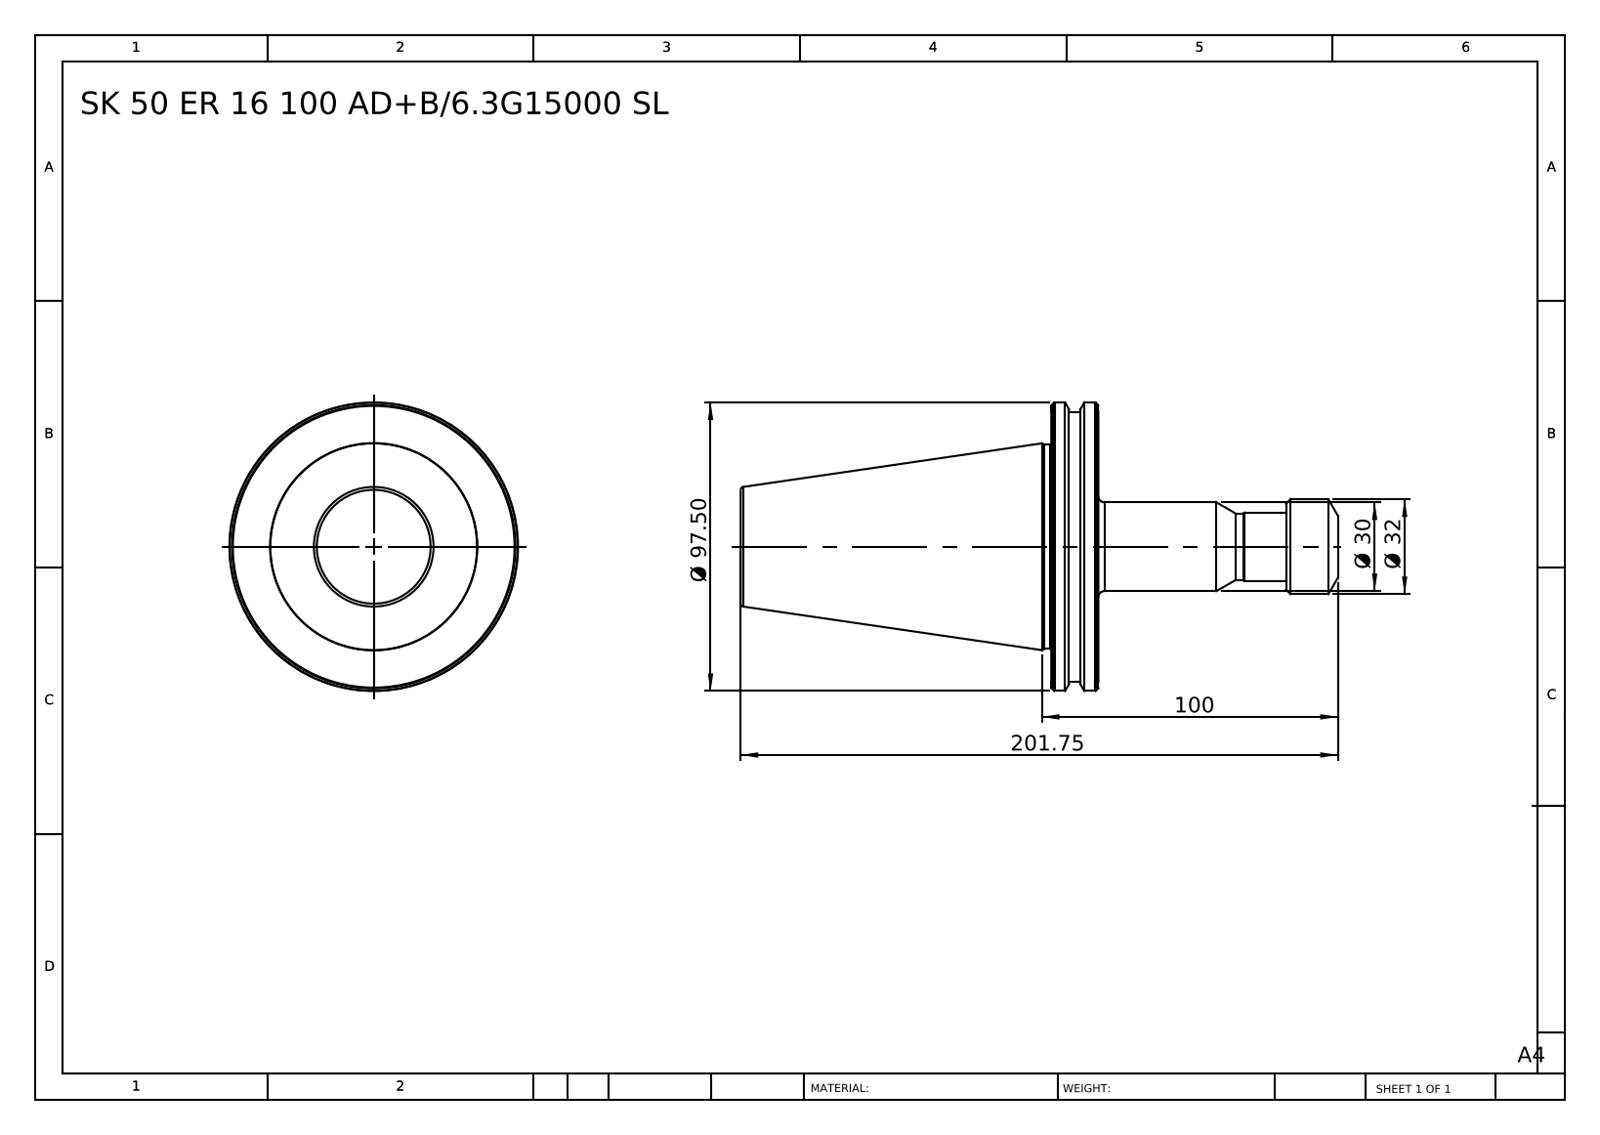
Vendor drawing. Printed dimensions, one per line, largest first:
201.75
100
Ø 97.50
Ø 32
Ø 30
